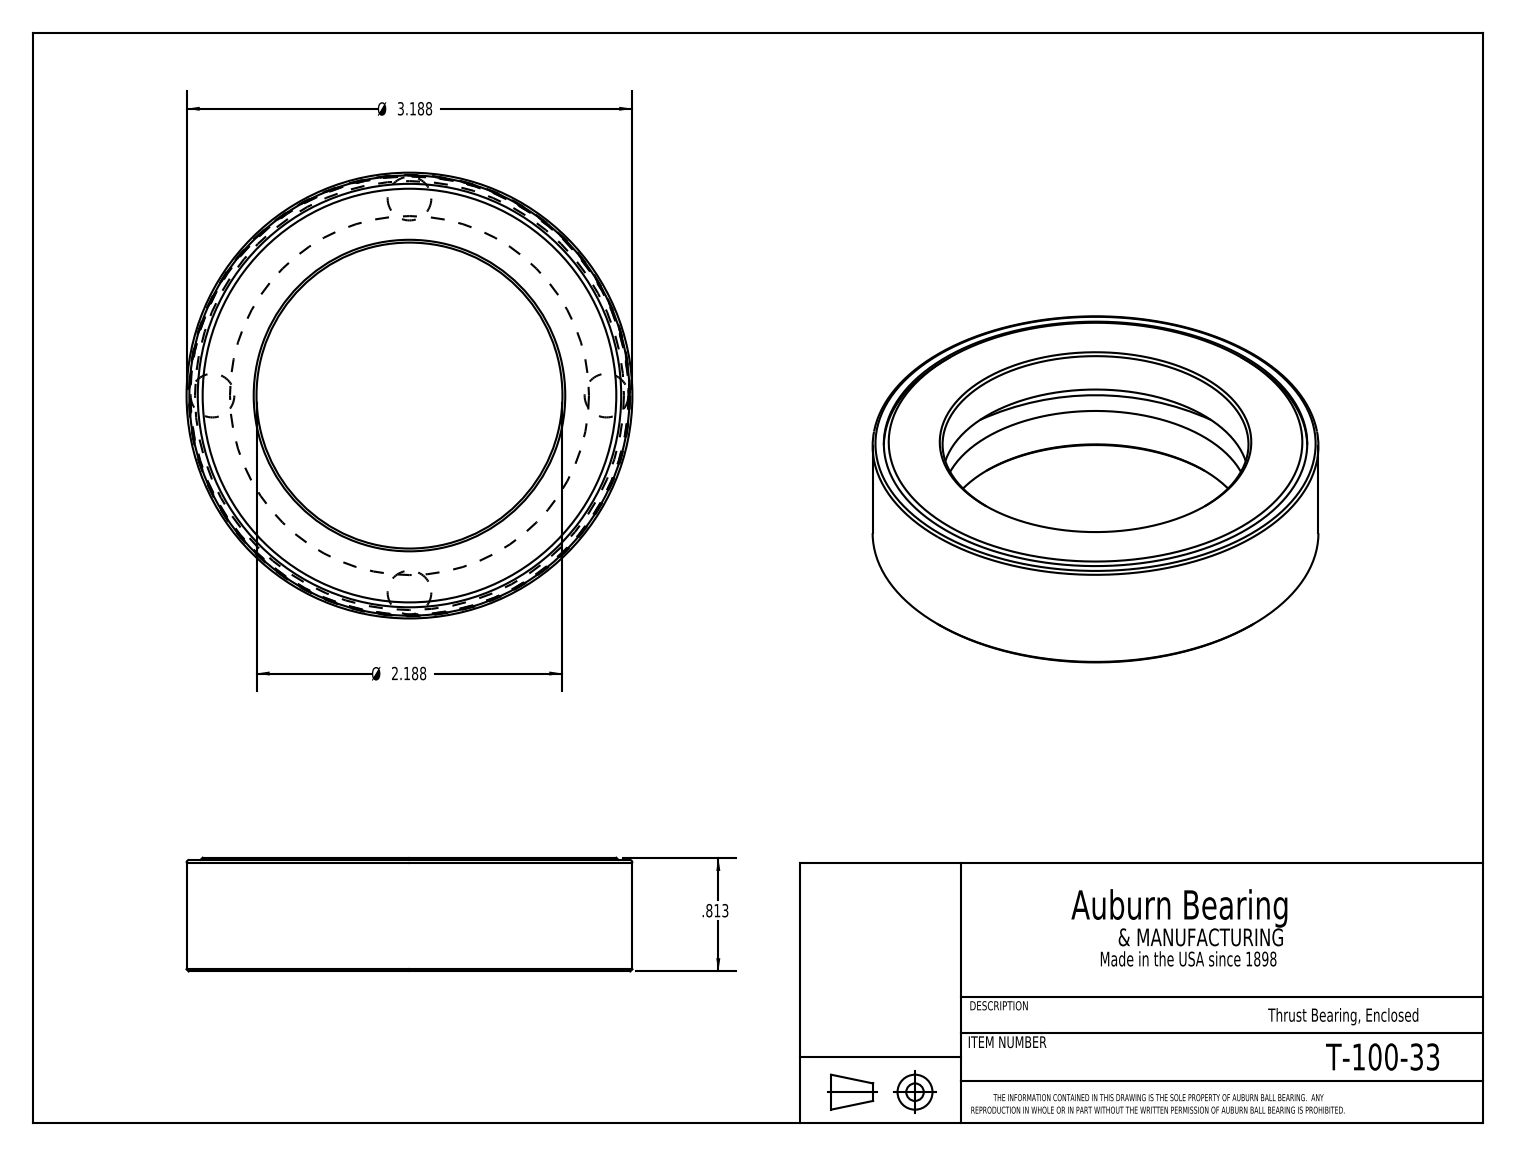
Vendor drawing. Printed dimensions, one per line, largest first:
Ø 3.188
Ø 2.188
.813
